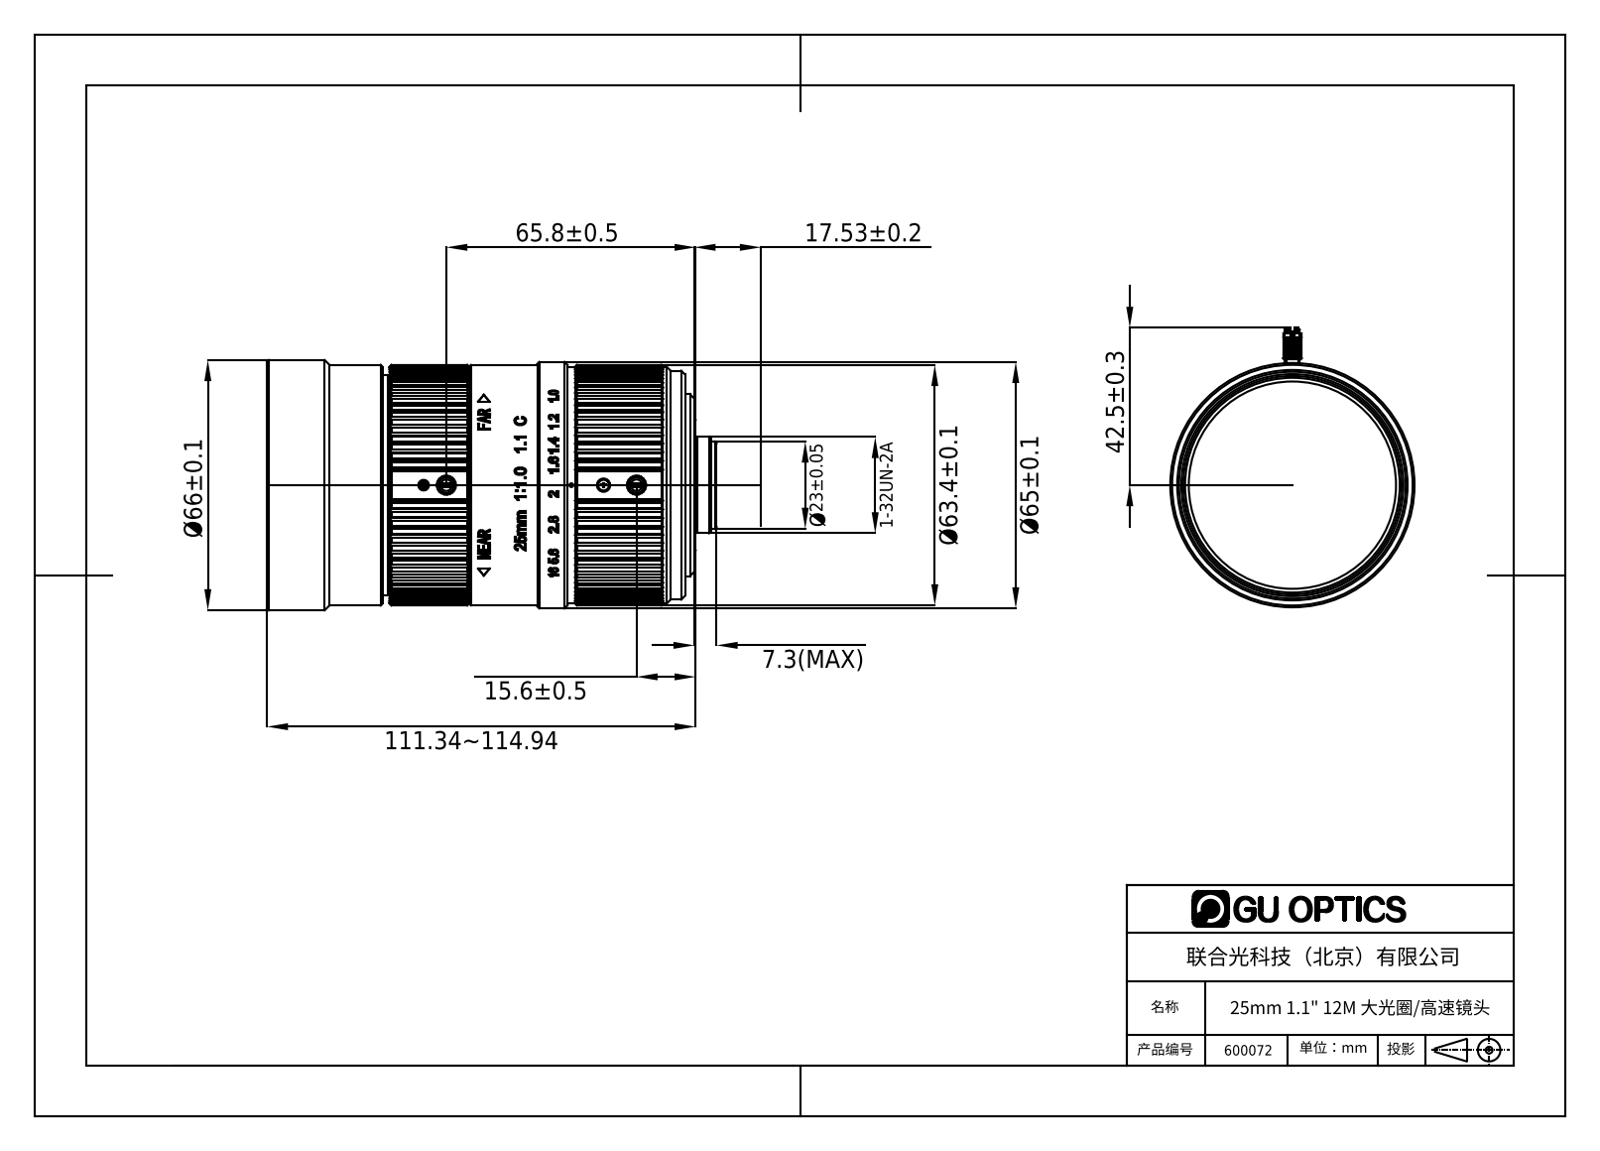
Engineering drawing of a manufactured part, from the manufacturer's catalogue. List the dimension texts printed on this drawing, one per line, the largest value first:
111.34~114.94
Ø66±0.1
65.8±0.5
Ø65±0.1
Ø63.4±0.1
42.5±0.3
Ø23±0.05
17.53±0.2
15.6±0.5
7.3(MAX)
1-32UN-2A
